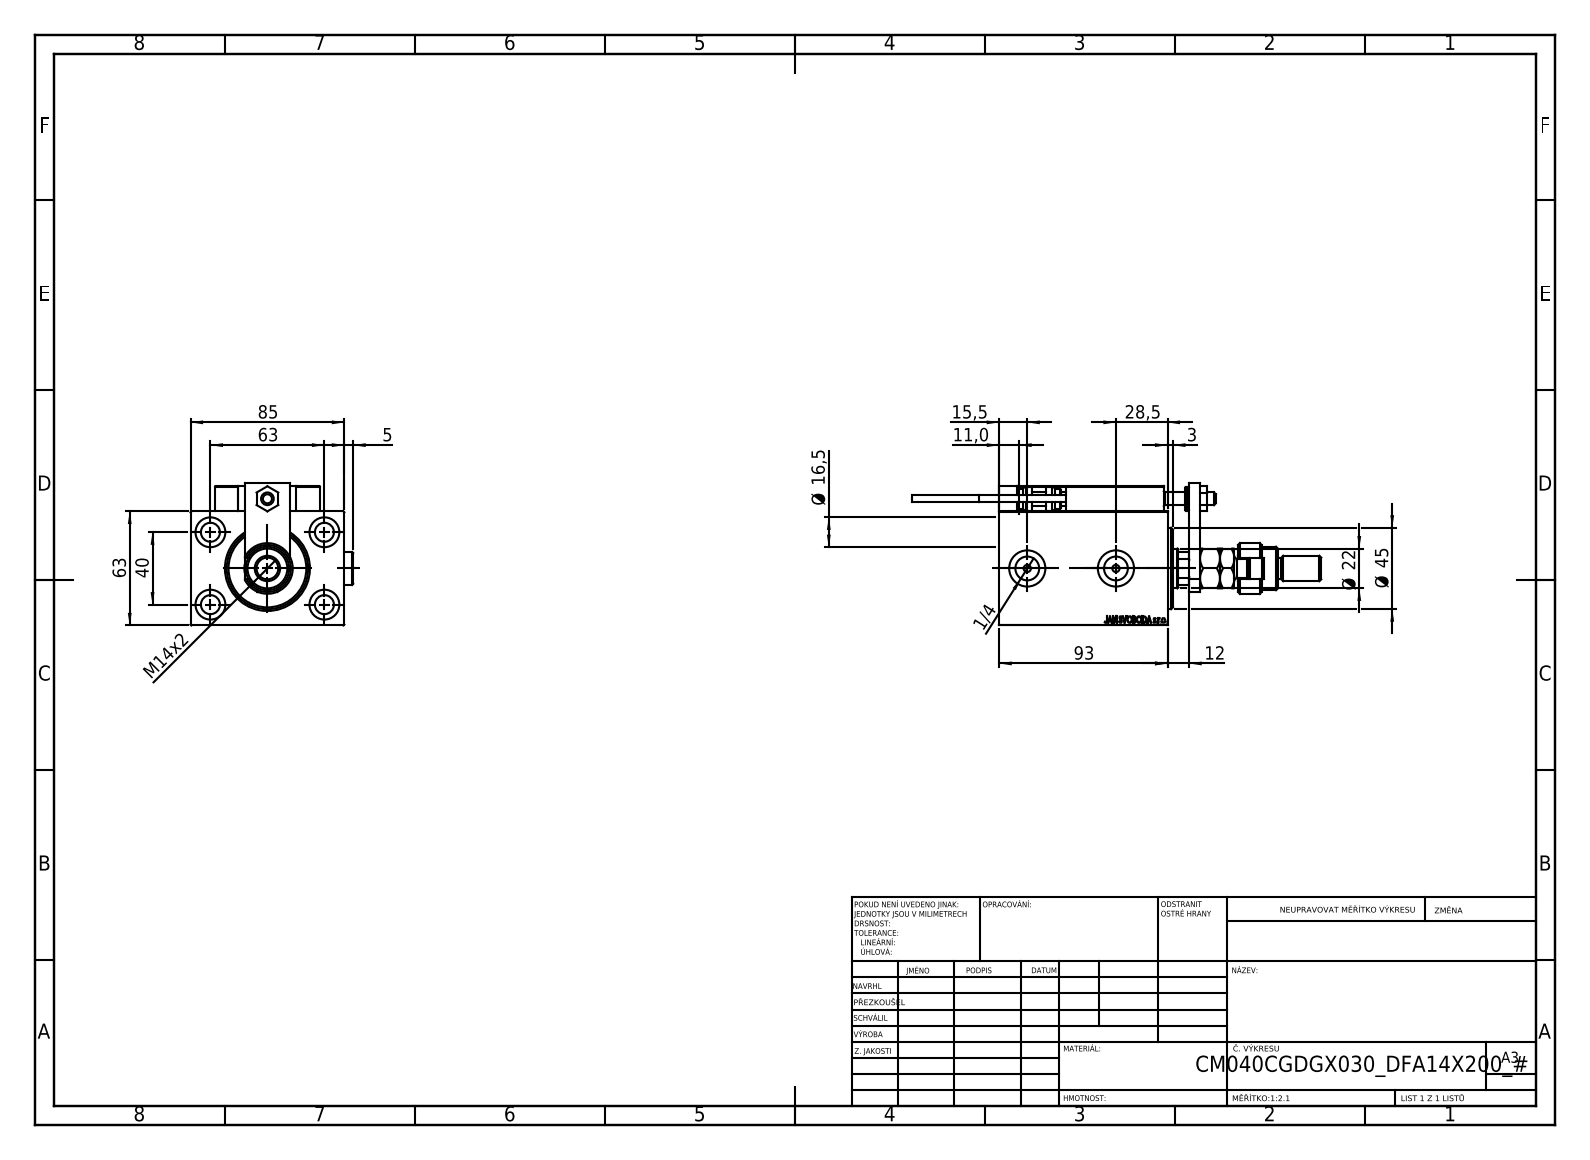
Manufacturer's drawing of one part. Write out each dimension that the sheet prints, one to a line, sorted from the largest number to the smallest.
93
85
63
63
Ø 45
40
28,5
Ø 22
Ø 16,5
15,5
M14x2
12
11,0
5
3
1/4
